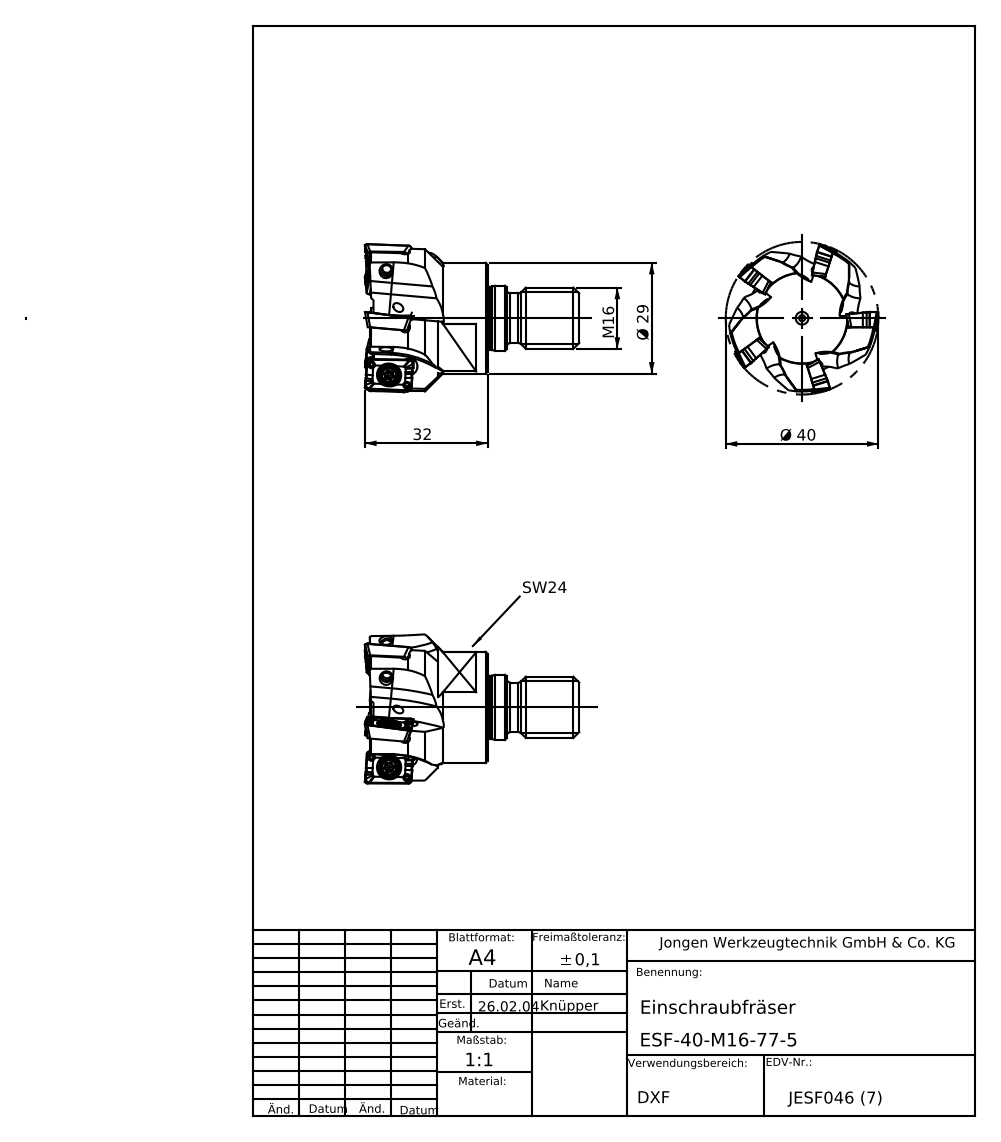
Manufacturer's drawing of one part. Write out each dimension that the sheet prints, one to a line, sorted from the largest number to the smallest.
Ø 40
32
Ø 29
M 16
